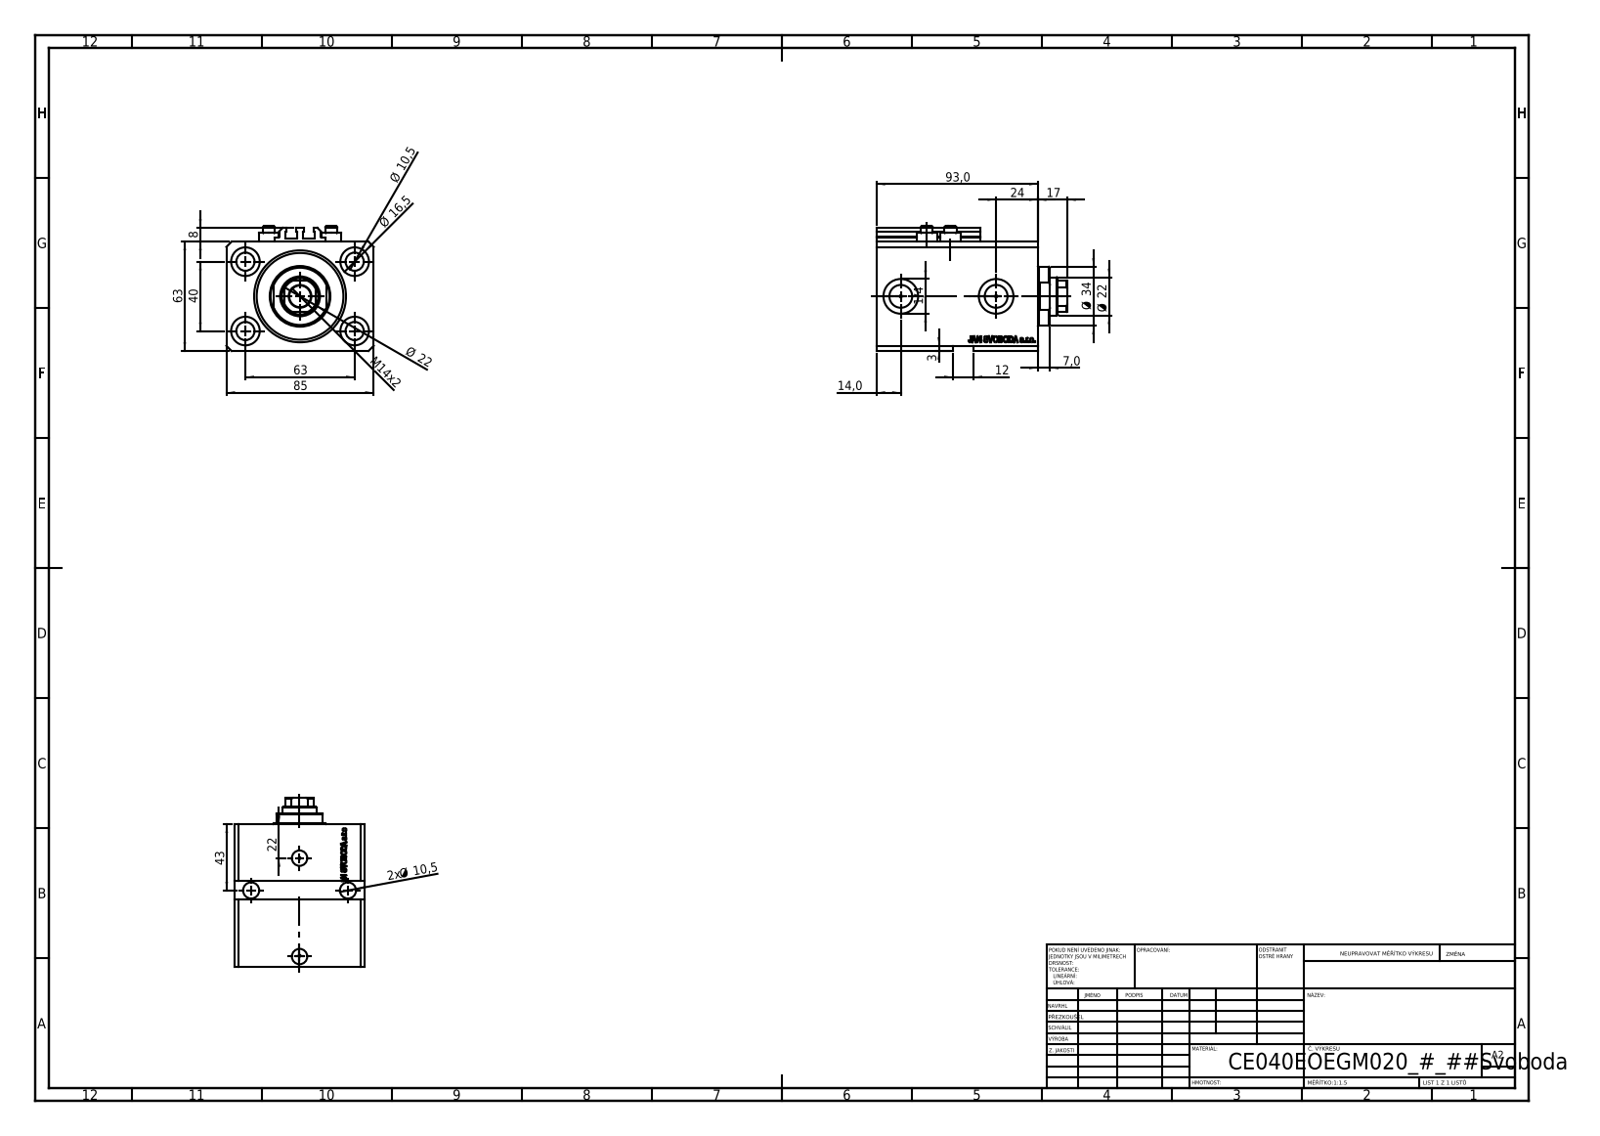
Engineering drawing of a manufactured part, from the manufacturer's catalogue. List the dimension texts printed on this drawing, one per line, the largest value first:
93,0
85
63
63
43
40
Ø 34
24
Ø 22
Ø 22
22
17
Ø 16,5
M14x2
14,0
12
Ø 10,5
2x Ø 10,5
8
7,0
3
1/4
